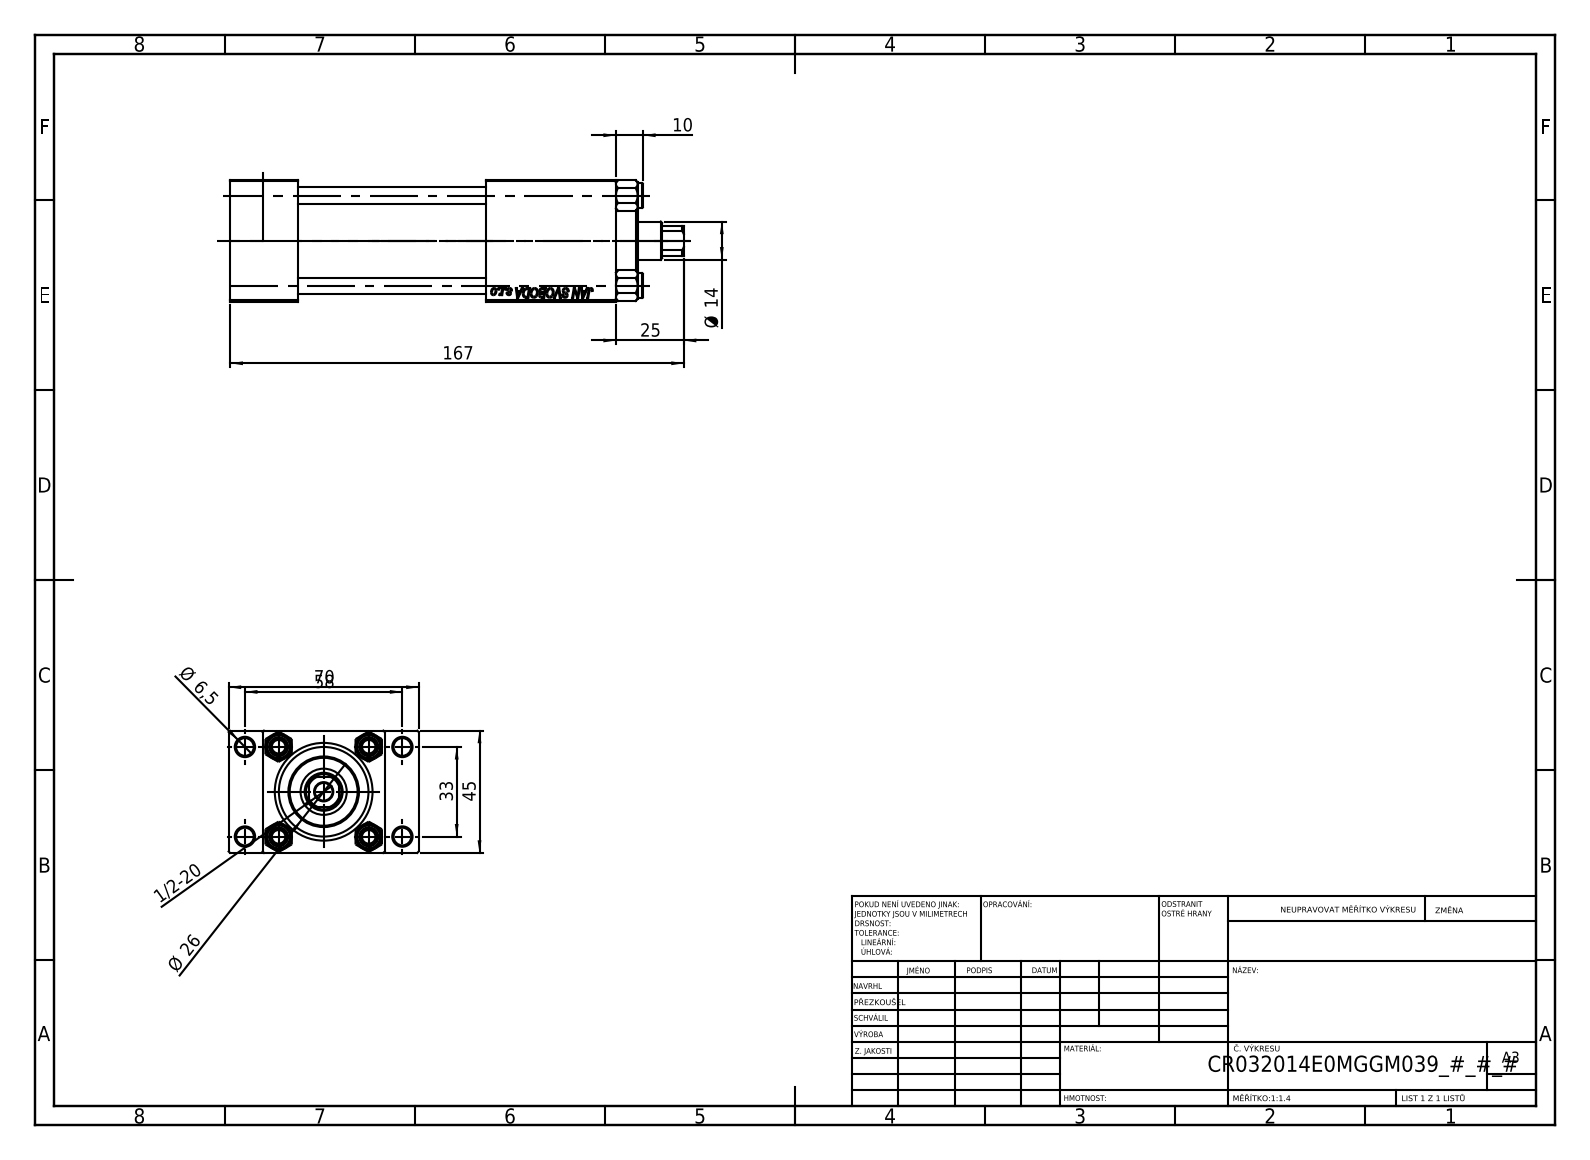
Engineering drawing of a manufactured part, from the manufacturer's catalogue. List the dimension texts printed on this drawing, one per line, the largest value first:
167
70
58
45
33
Ø 26
25
Ø 14
10
Ø 6,5
1/2-20
